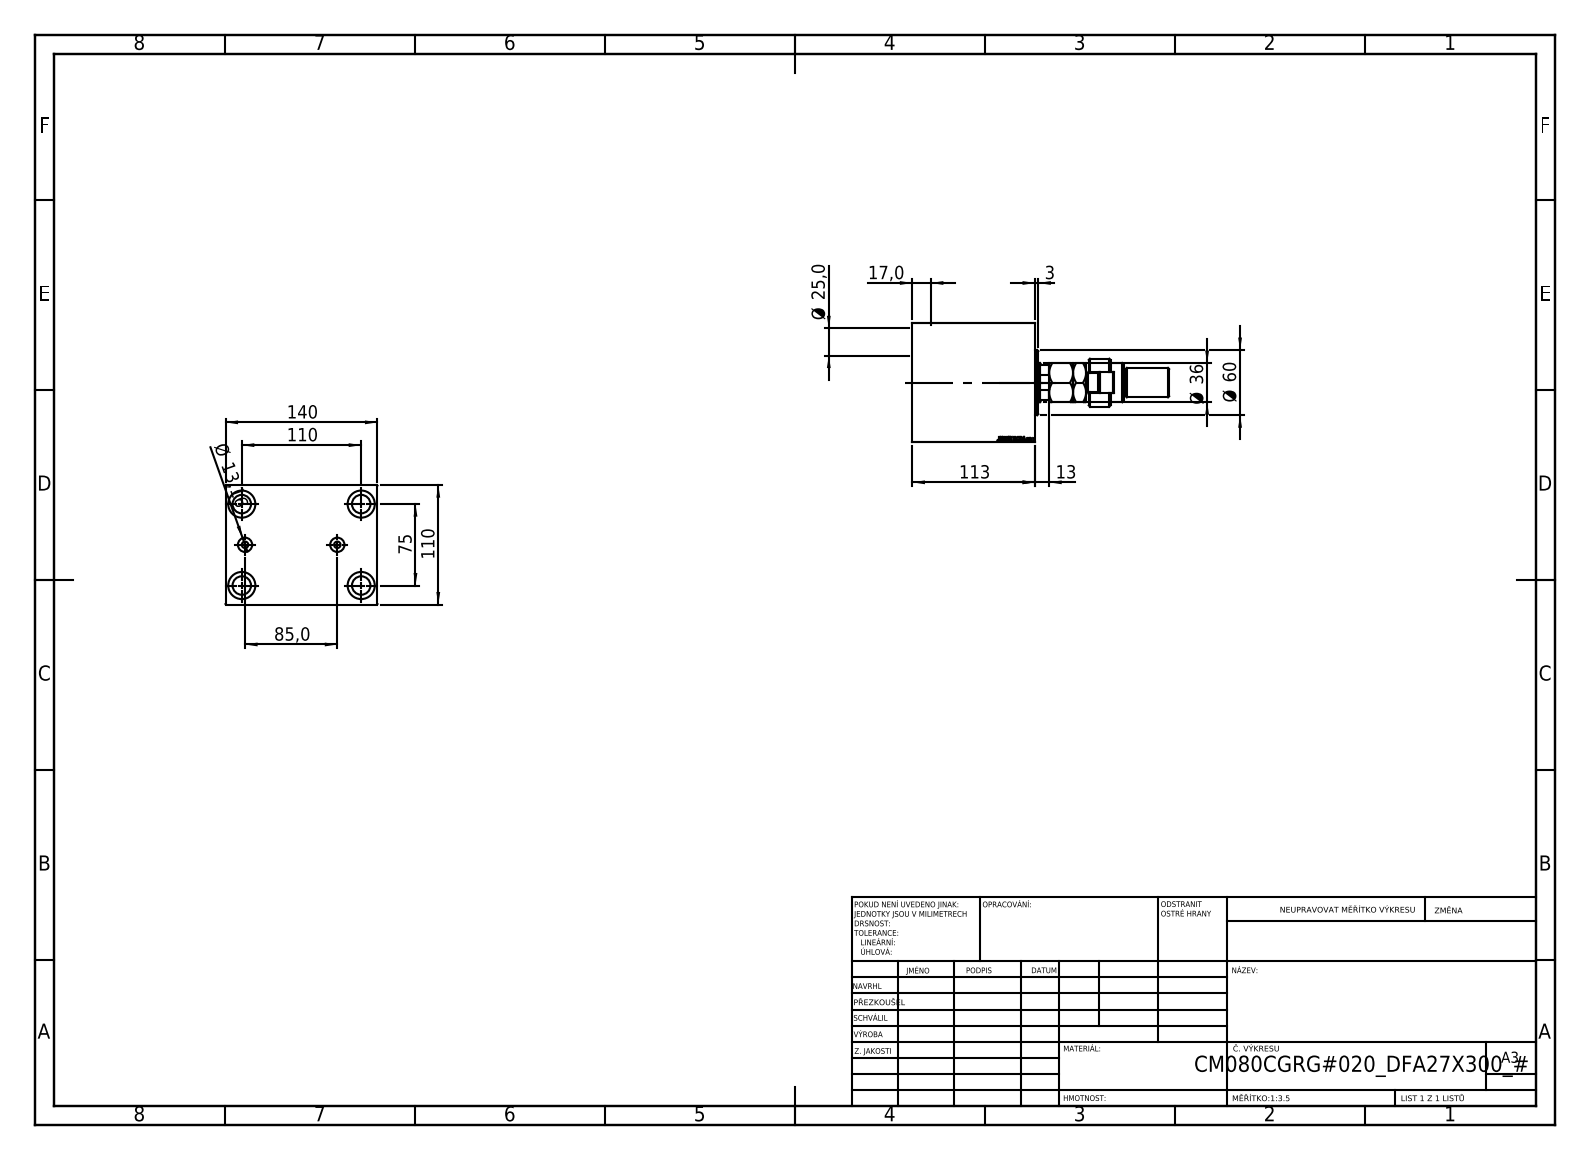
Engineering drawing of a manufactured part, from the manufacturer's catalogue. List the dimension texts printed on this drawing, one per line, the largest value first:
140
113
110
110
85,0
75
Ø 60
Ø 36
Ø 25,0
17,0
Ø 13,16
13
3
